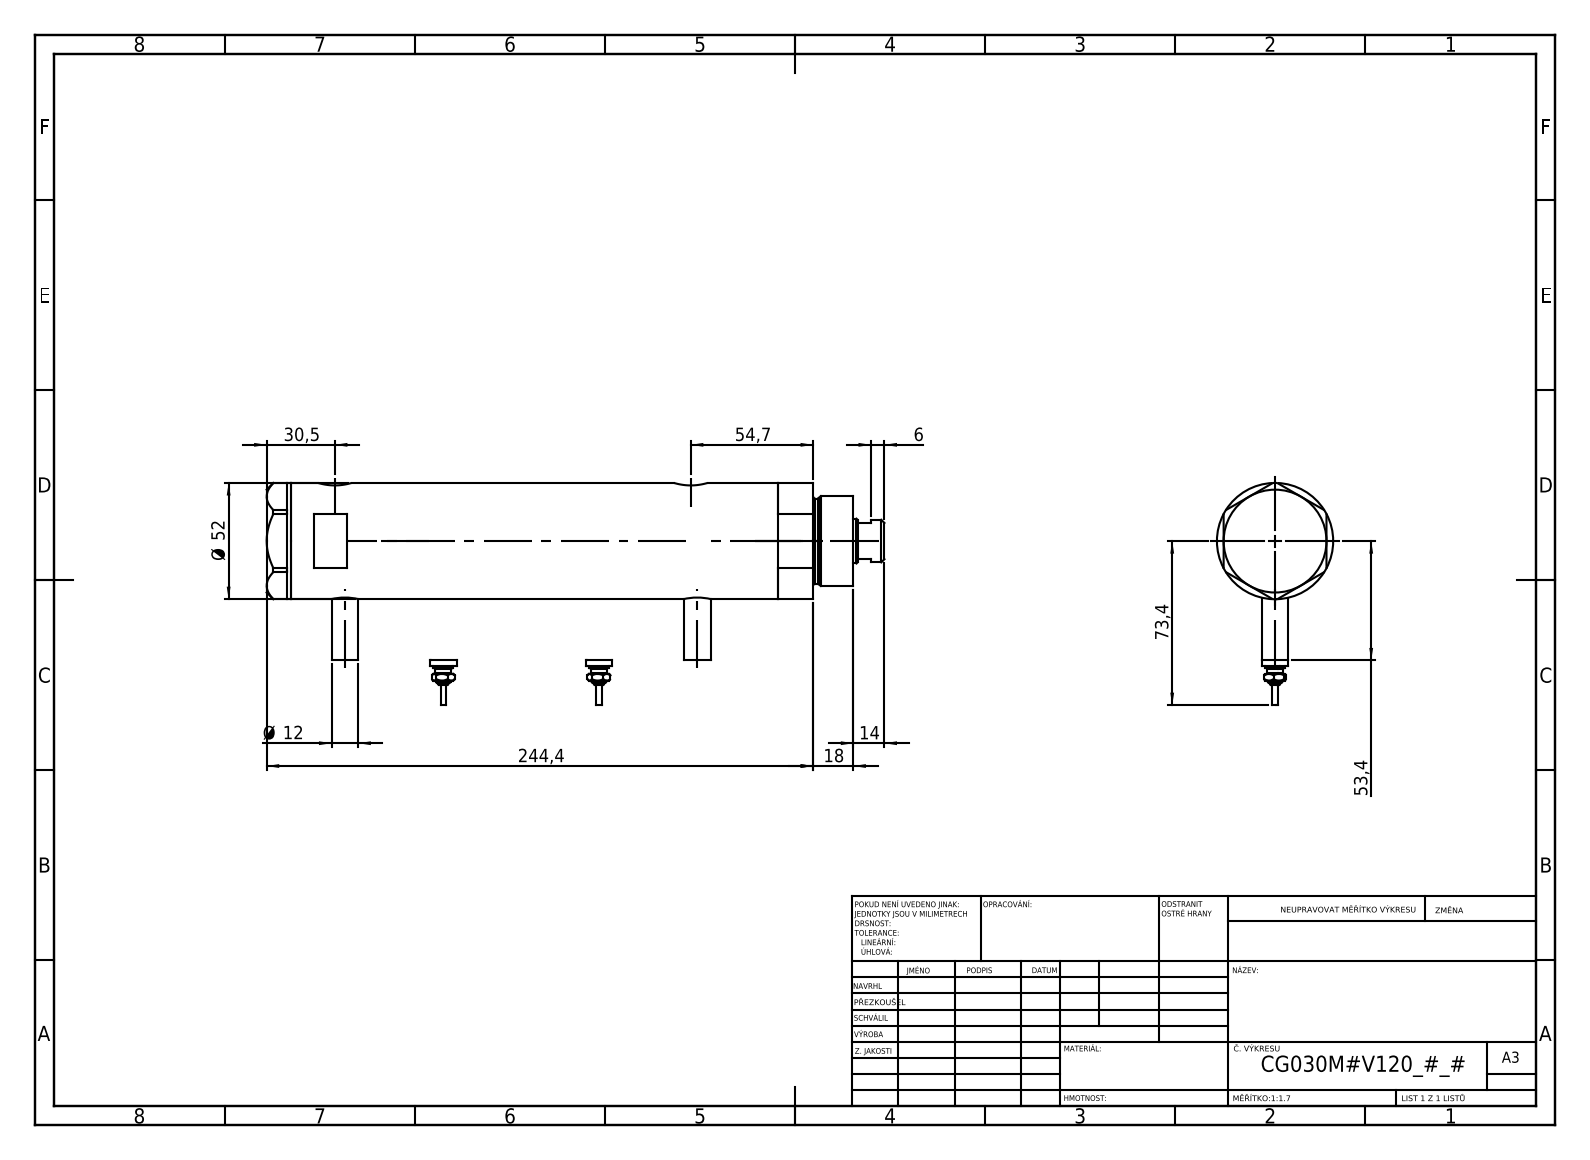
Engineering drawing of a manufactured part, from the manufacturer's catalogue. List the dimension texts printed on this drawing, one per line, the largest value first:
244,4
73,4
54,7
53,4
Ø 52
30,5
18
14
Ø 12
6
